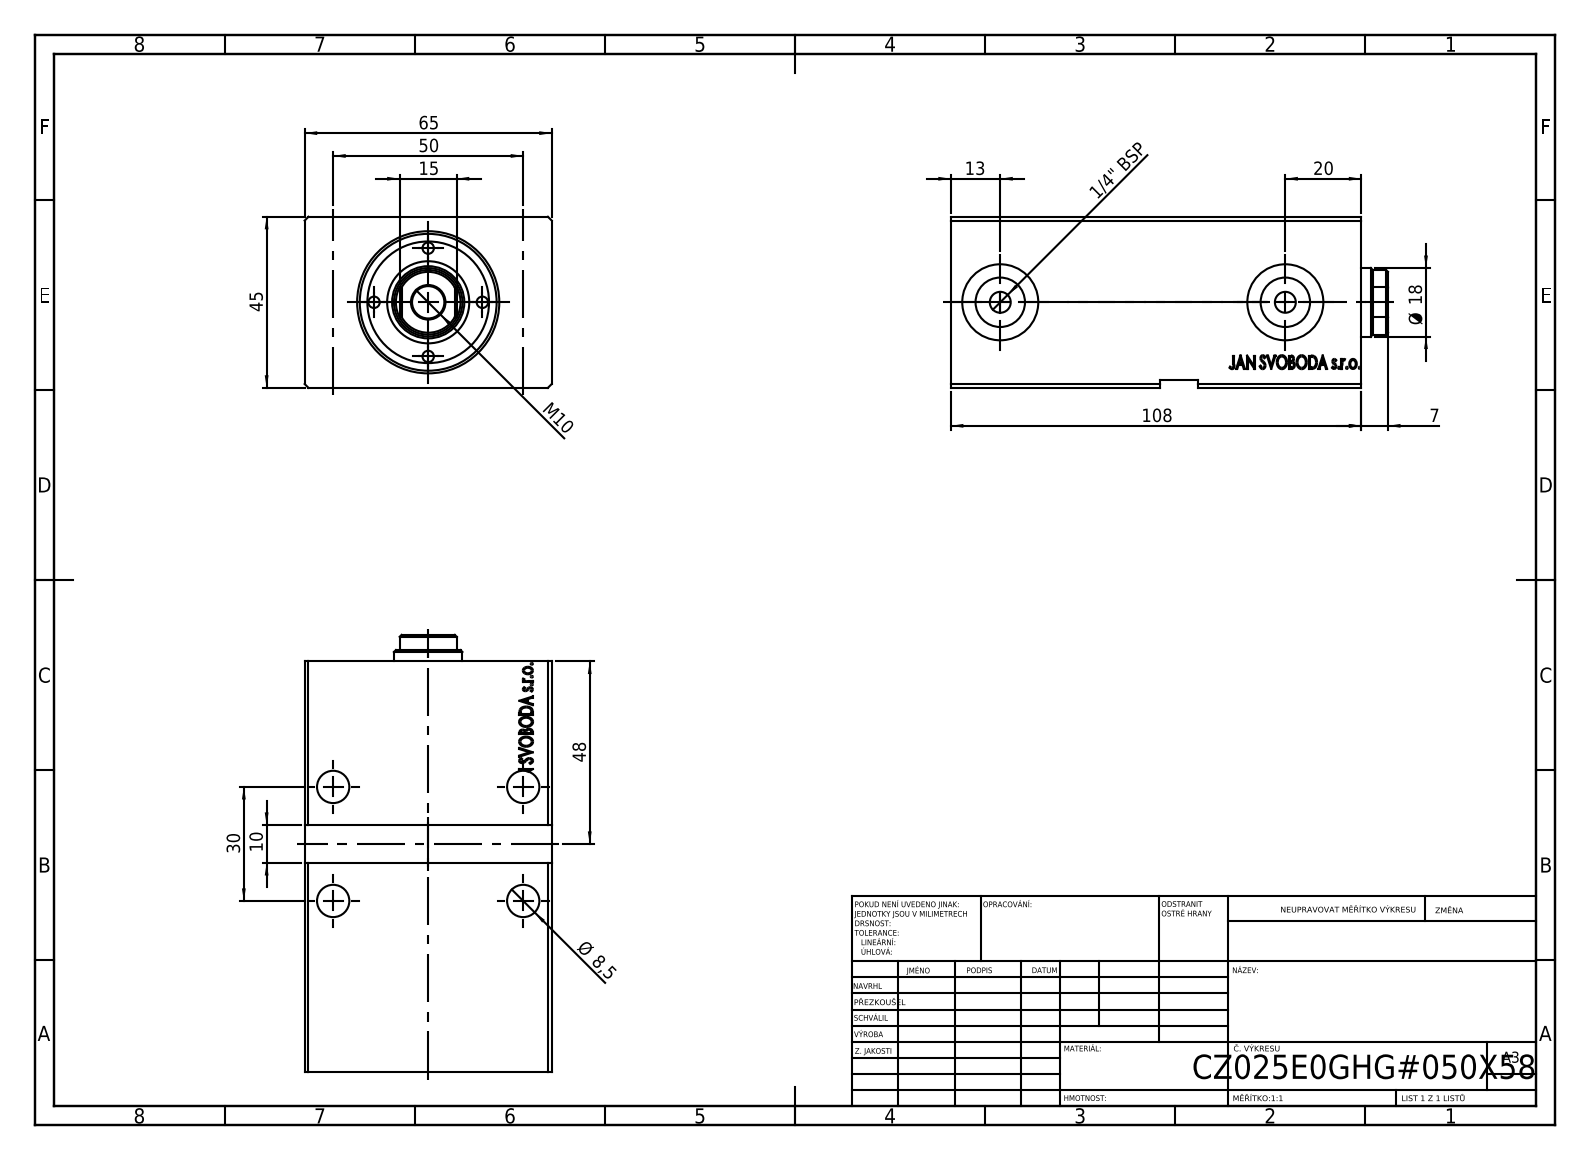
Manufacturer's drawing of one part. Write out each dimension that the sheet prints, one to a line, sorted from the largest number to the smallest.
108
65
50
48
45
30
20
Ø 18
15
13
M10
10
Ø 8,5
7
1/4" BSP
